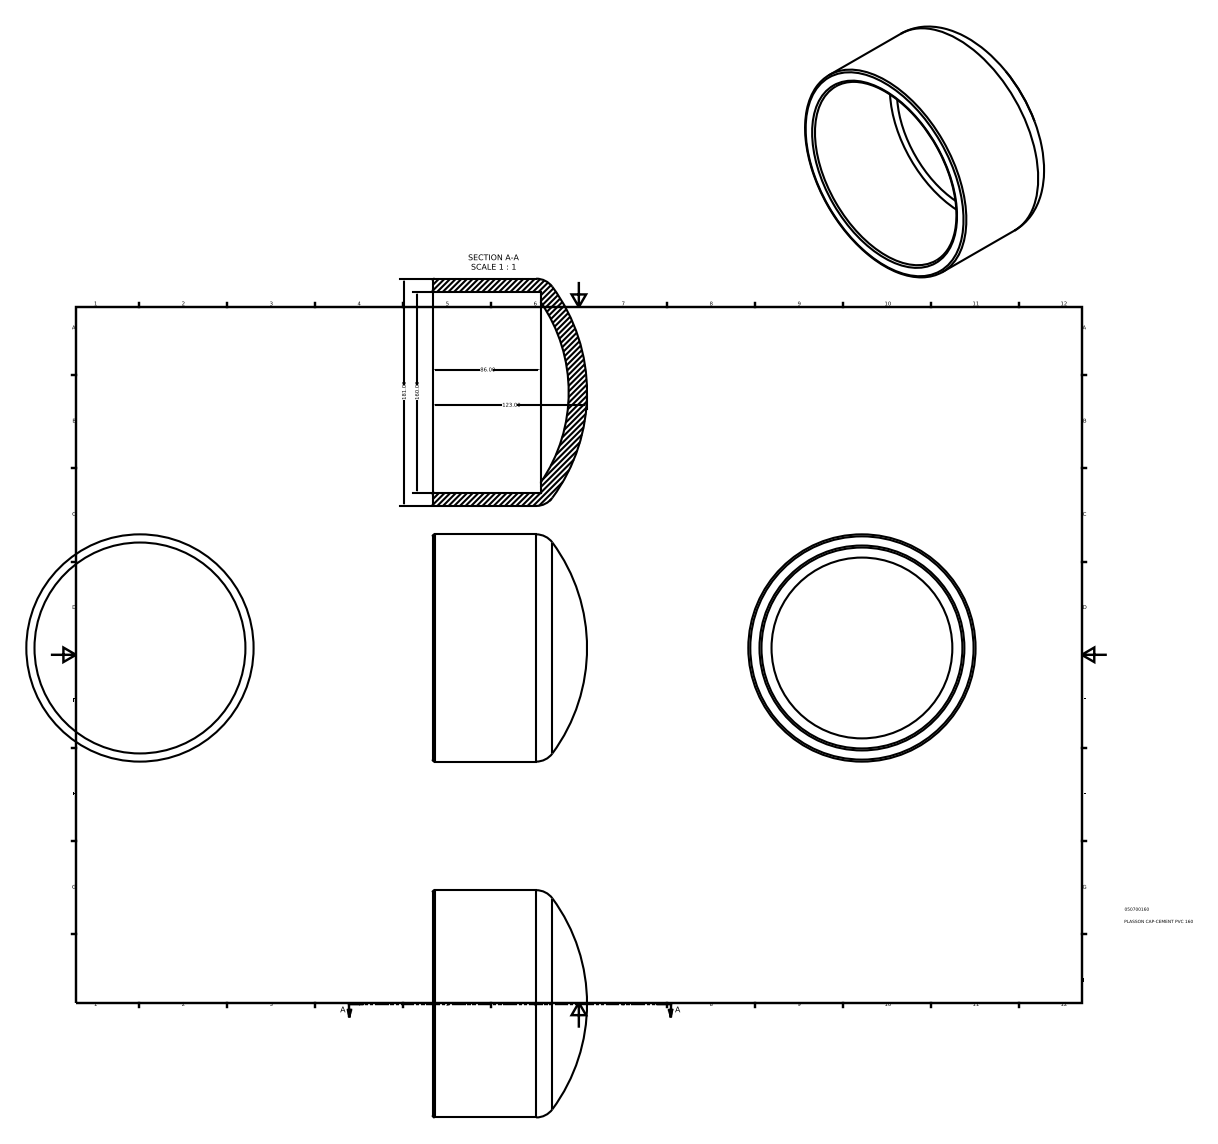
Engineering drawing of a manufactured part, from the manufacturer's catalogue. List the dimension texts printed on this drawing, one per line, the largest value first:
181.00
160.00
123.00
86.00
